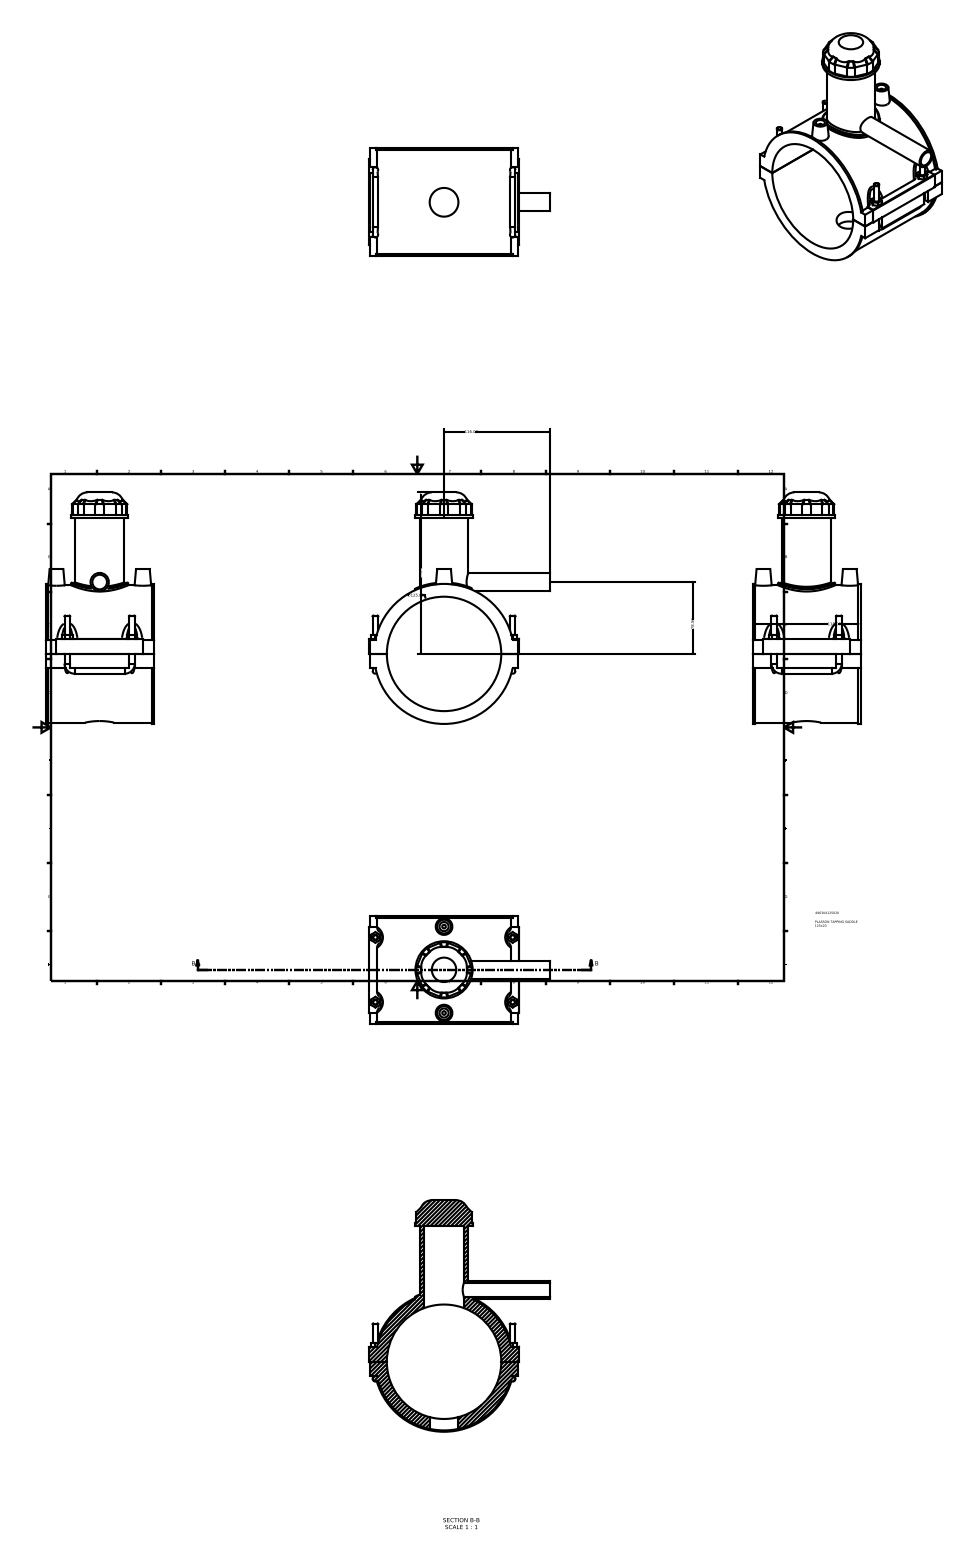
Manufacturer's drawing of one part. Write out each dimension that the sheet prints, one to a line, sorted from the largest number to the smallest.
176.50
∅125.00
118.00
116.00
78.50
